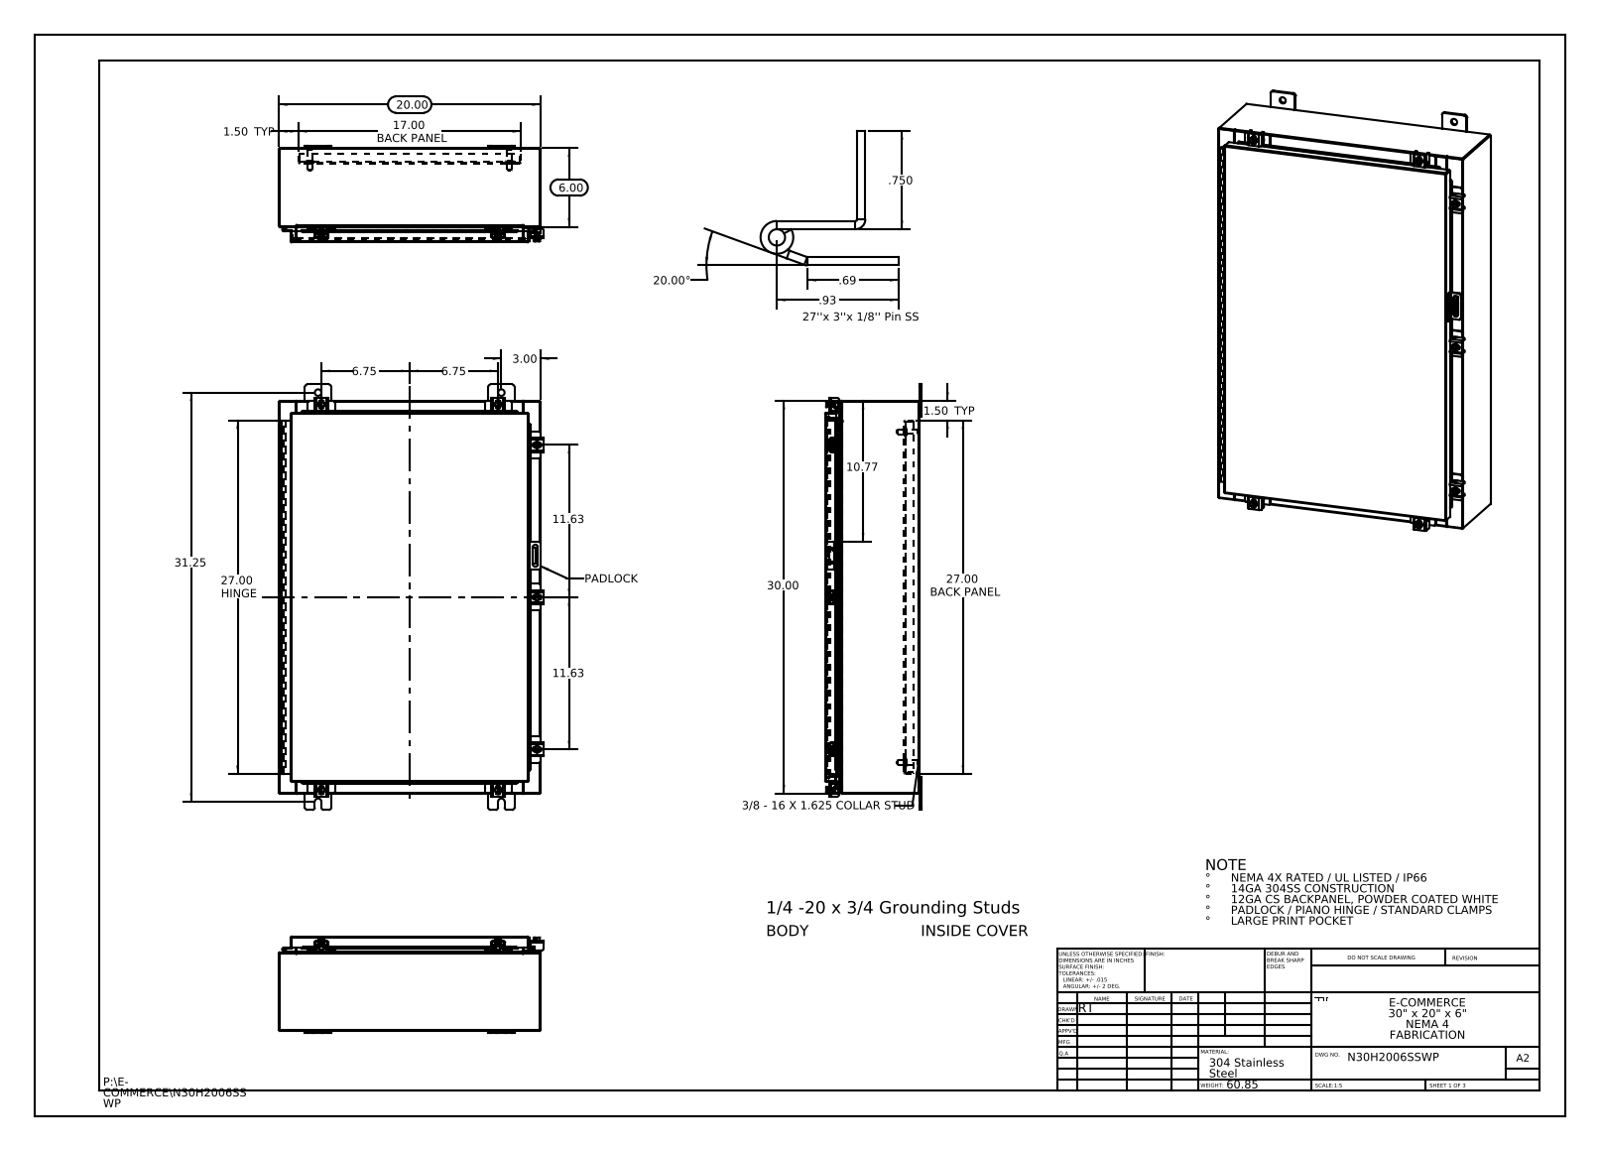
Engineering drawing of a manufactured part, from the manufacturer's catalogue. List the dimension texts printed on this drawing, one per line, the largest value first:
31.25
30.00
27.00 HINGE
27.00 BACK PANEL
20.00
20.00°
17.00 BACK PANEL
11.63
11.63
10.77
6.75
6.75
6.00
3.00
1.50 TYP
1.50 TYP
.93
.750
.69
